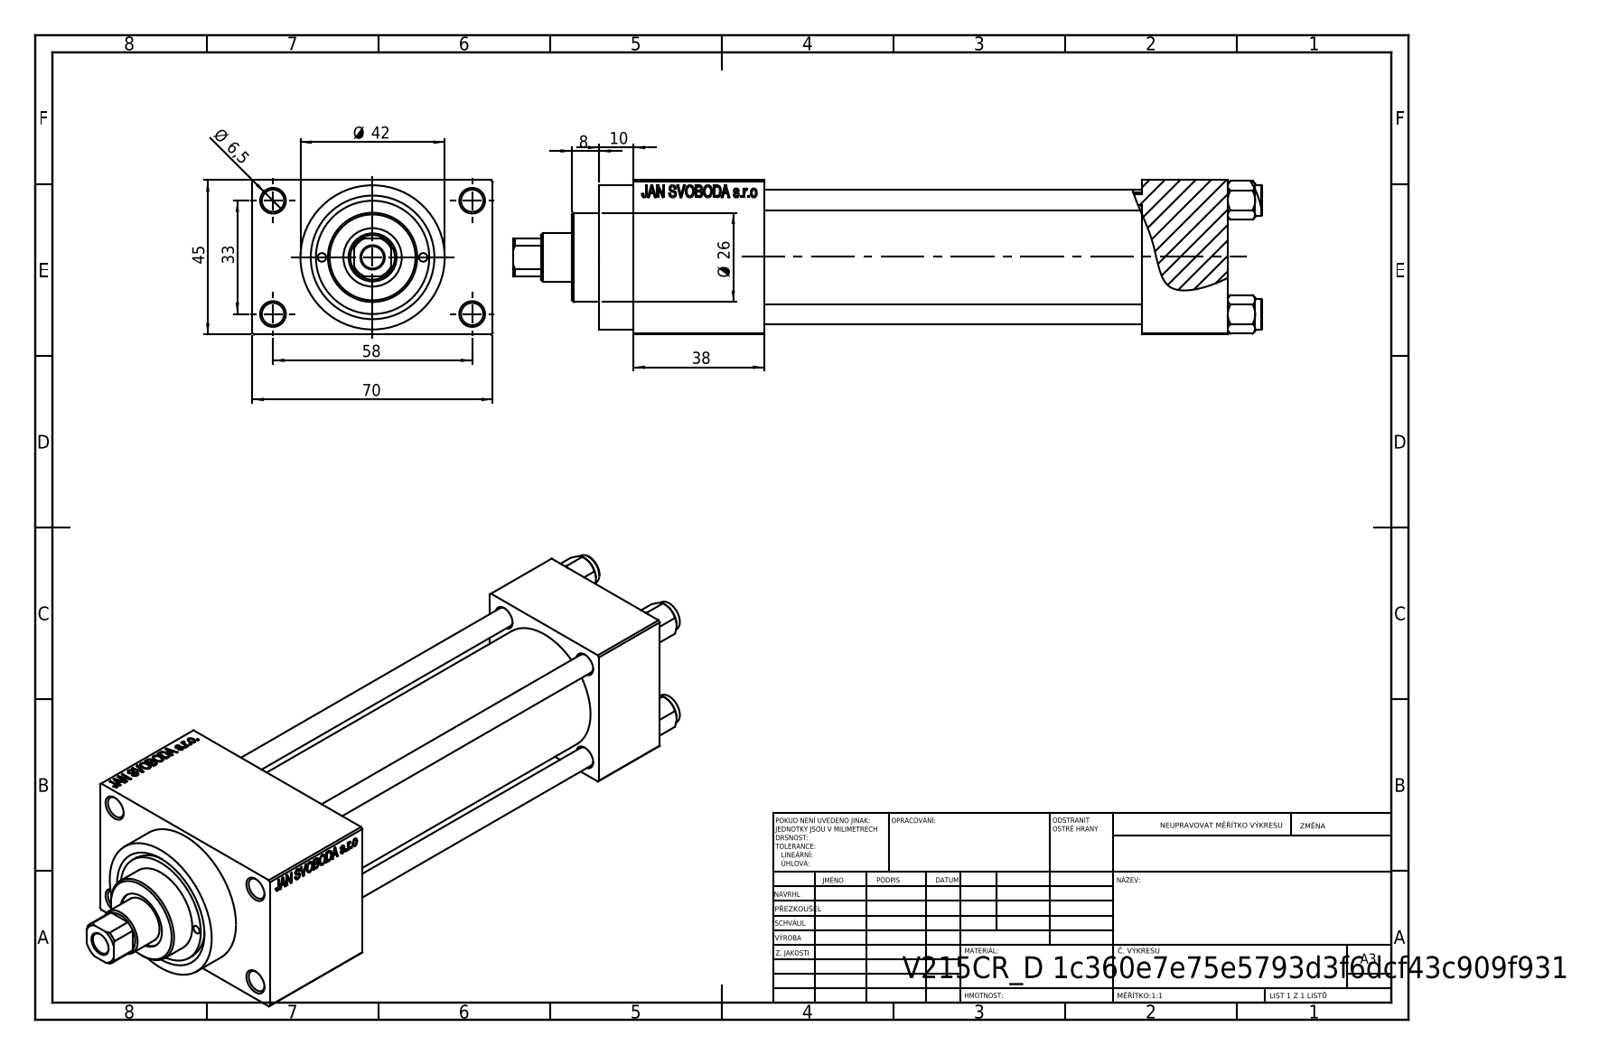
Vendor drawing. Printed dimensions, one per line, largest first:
70
58
45
Ø 42
38
33
Ø 26
10
8
Ø 6,5
